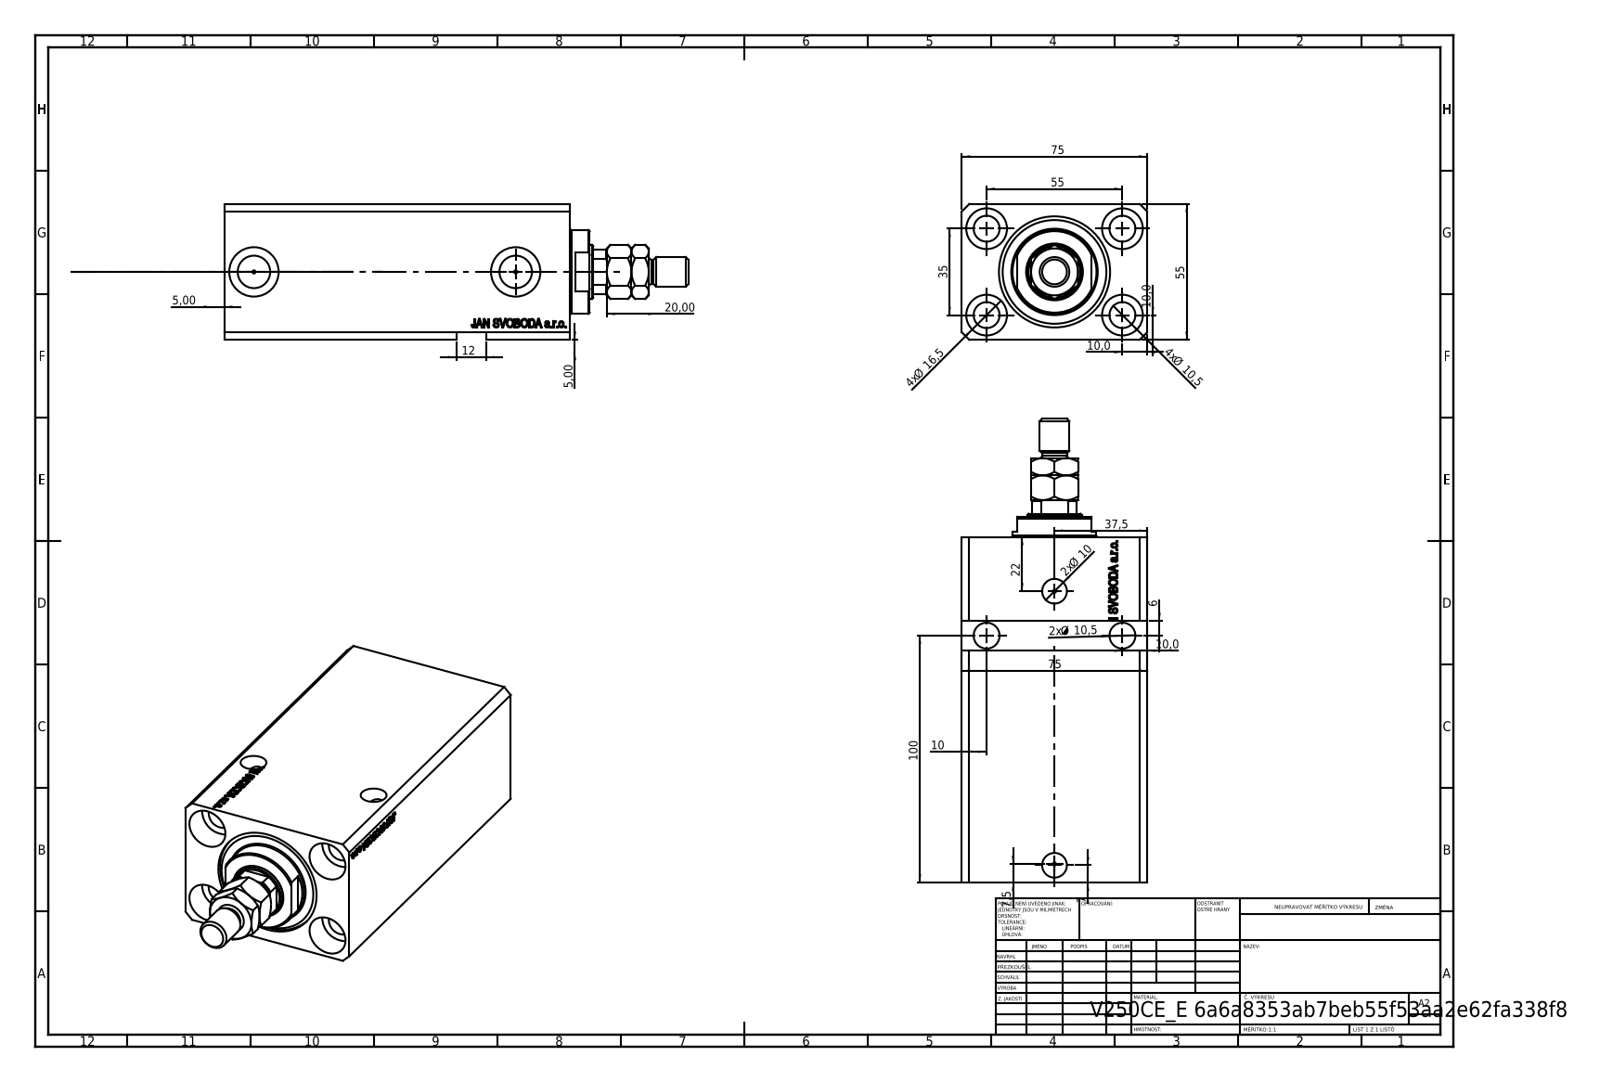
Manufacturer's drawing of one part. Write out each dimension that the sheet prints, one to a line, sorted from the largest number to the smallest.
100
75
75
55
55
37,5
35
22
20,00
4x Ø 16,5
12
4x Ø 10,5
2x Ø 10,5
10,0
10,0
2x Ø 10
10,0
10
7,5
7
6
5,00
5,00
